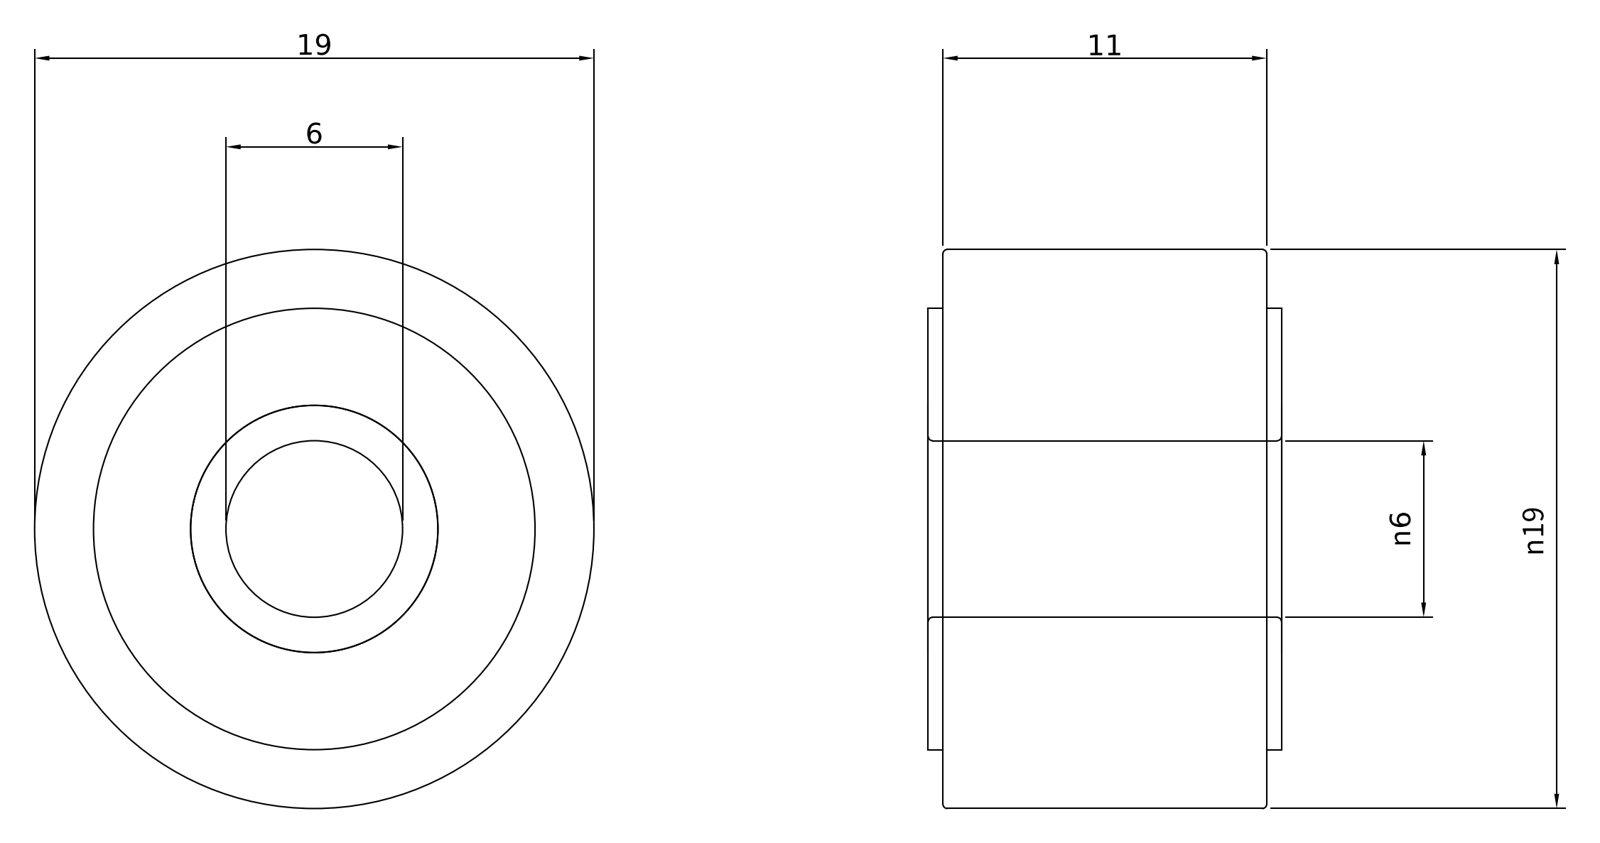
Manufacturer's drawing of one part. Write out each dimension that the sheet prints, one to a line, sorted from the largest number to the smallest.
19
n19
11
6
n6
